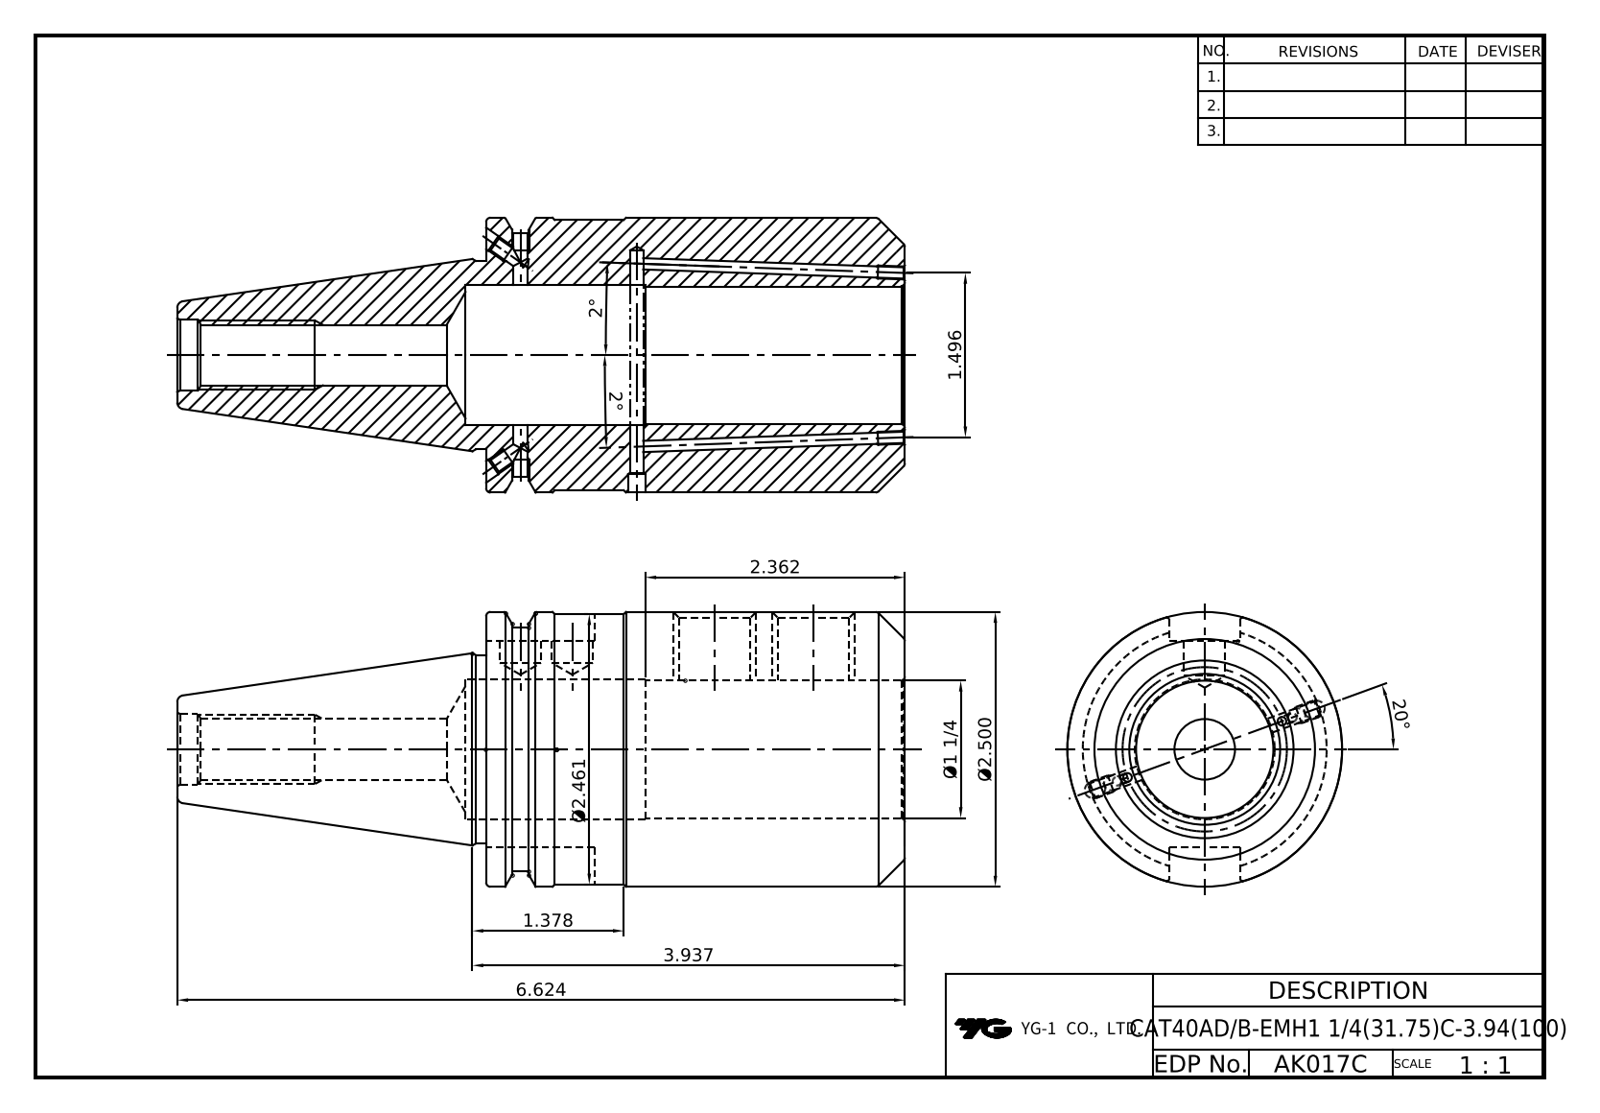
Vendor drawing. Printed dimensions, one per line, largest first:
20°
6.624
3.937
Ø2.500
Ø2.461
2.362
2°
2°
1.496
1.378
Ø1 1/4
